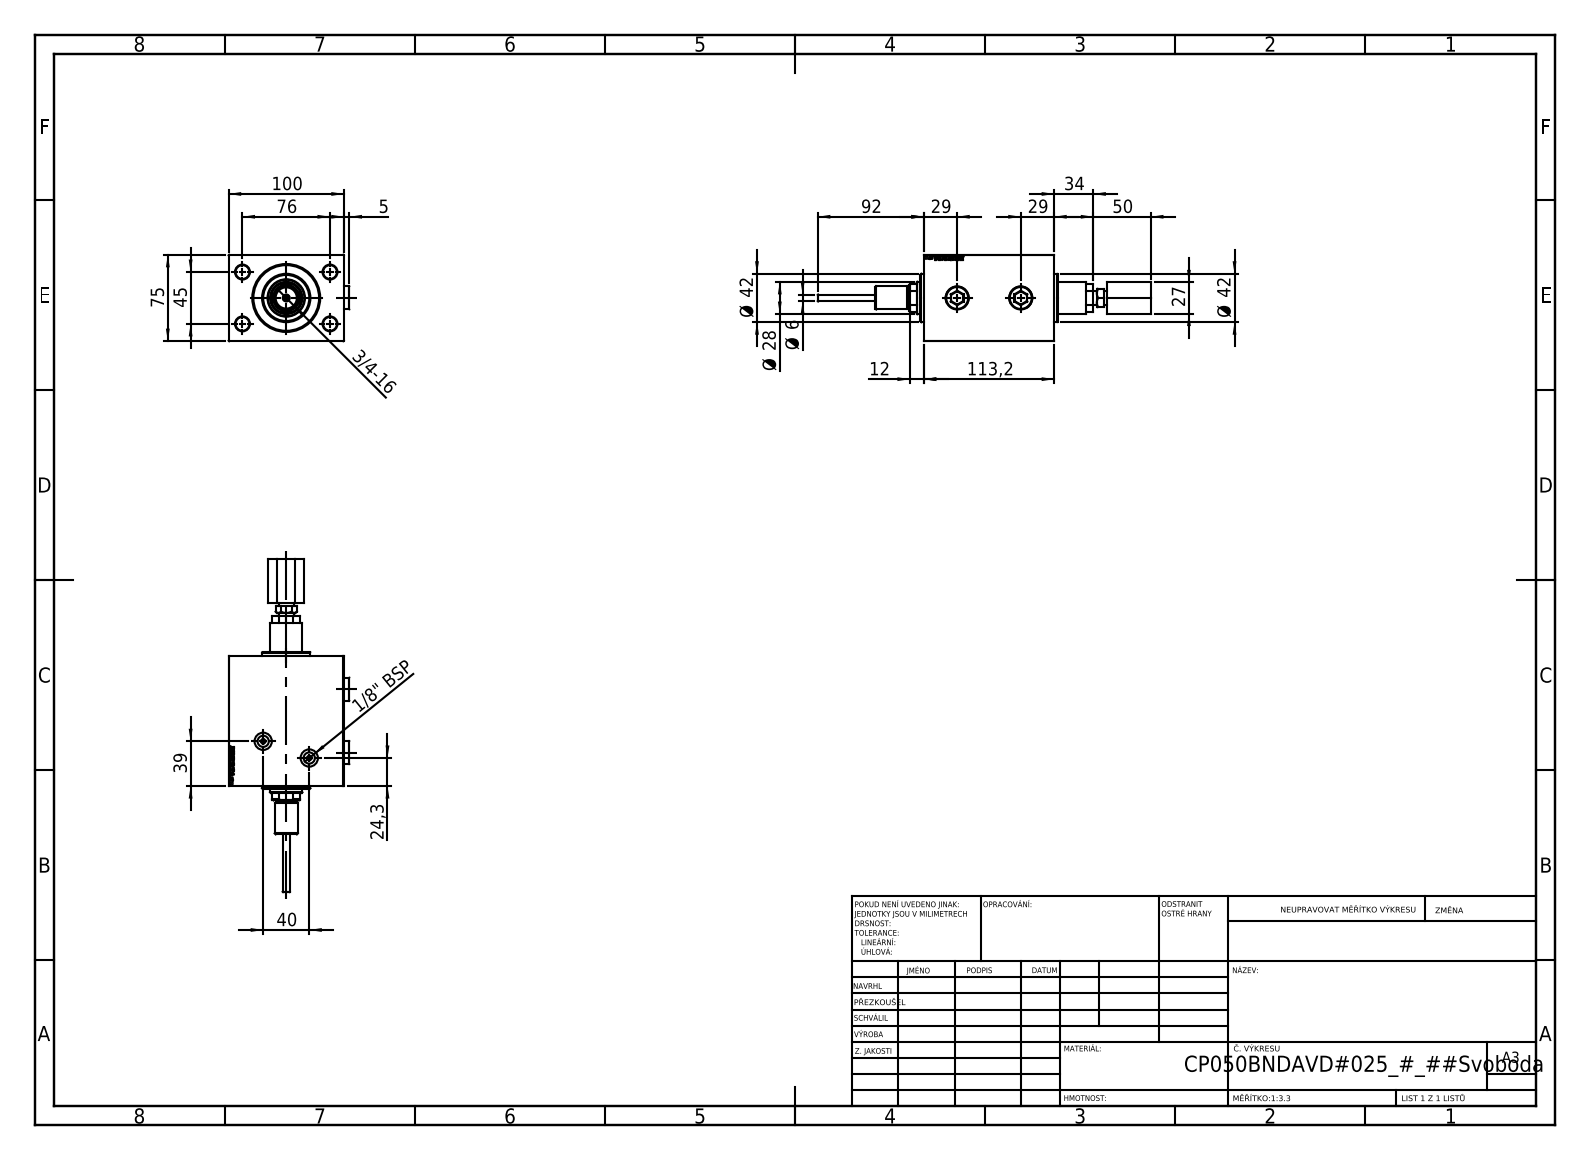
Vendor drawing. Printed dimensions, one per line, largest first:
113,2
100
92
76
75
50
45
Ø 42
Ø 42
40
39
34
29
29
Ø 28
27
24,3
12
Ø 6
5
3/4-16
1/8" BSP
